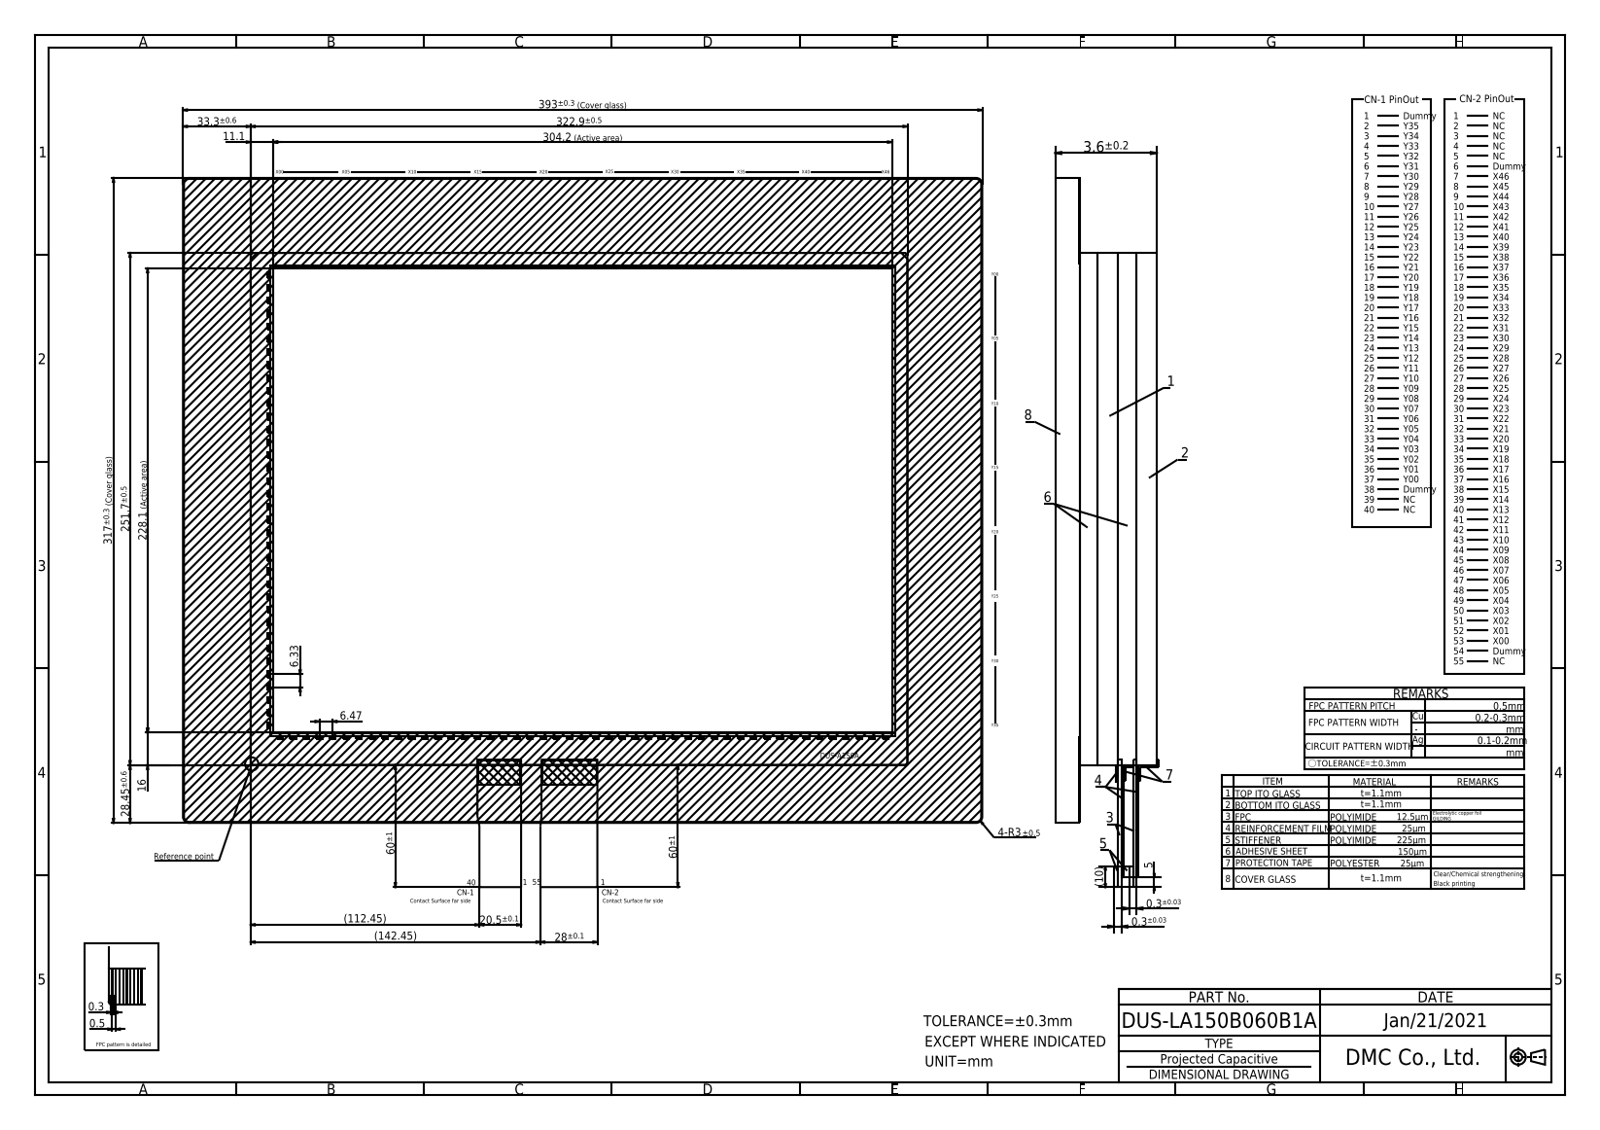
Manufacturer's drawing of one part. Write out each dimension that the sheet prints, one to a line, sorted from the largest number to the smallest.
393±0.3 (Cover glass)
322.9±0.5
317±0.3 (Cover glass)
304.2 (Active area)
251.7±0.5
228.1 (Active area)
(142.45)
(112.45)
60±1
60±1
33.3±0.6
28.45±0.6
28±0.1
20.5±0.1
16
11.1
(10)
6.47
6.33
5
3.6±0.2
0.5
0.3±0.03
0.3±0.03
0.3
